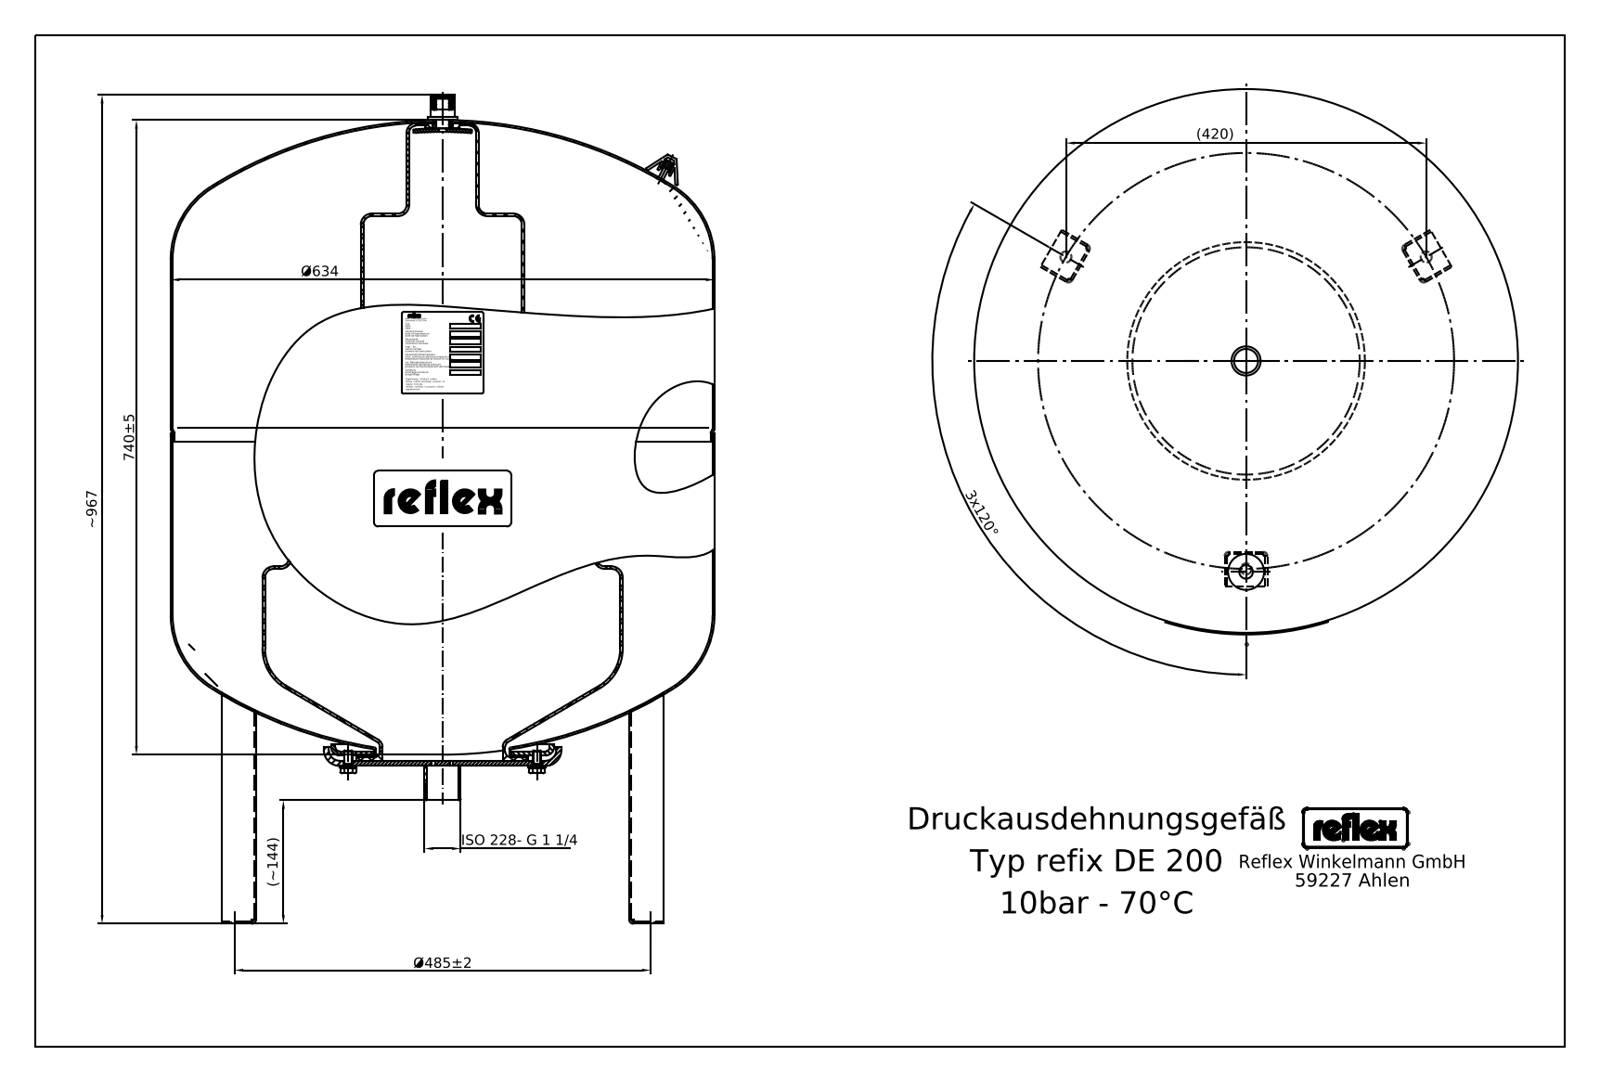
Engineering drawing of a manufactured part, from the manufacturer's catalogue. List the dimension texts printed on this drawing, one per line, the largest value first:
~967
740±5
Ø634
Ø485±2
(420)
ISO 228- G 1 1/4
(~144)
3x120°
